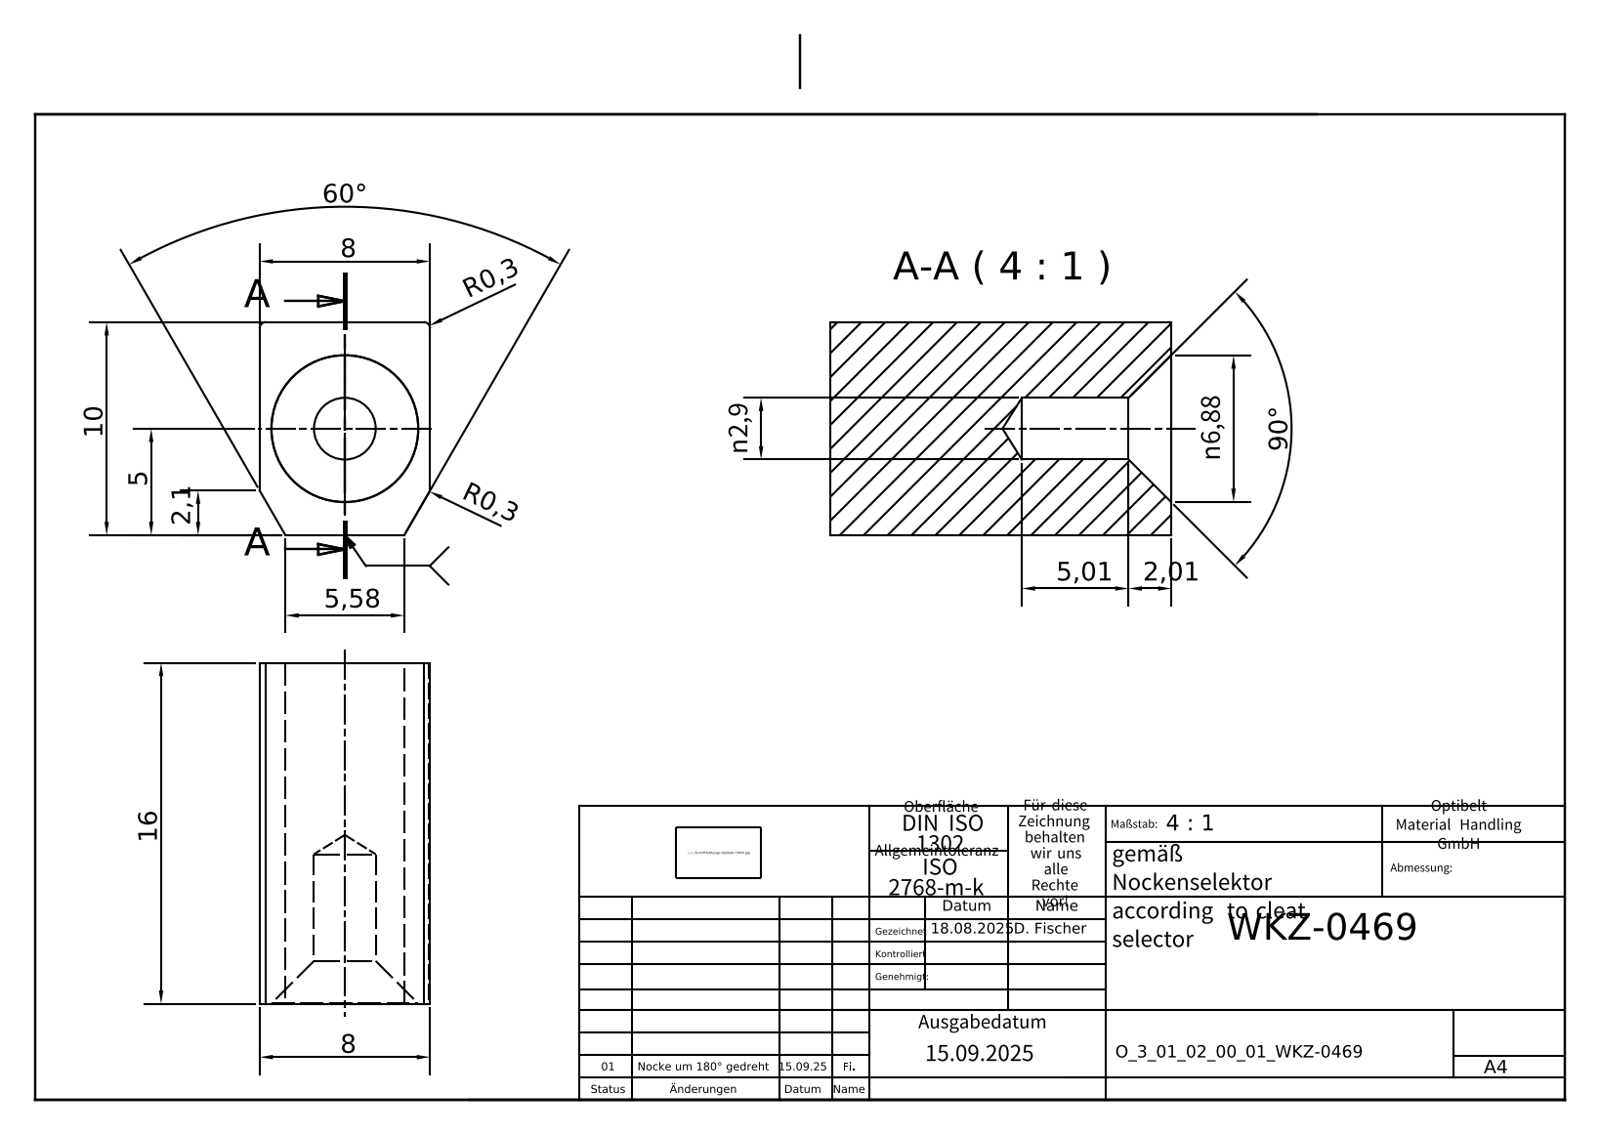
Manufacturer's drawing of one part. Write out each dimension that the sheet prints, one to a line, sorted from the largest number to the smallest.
90°
60°
16
10
8
8
n6,88
5,58
5,01
5
n2,9
2,1
2,01
R0,3
R0,3
